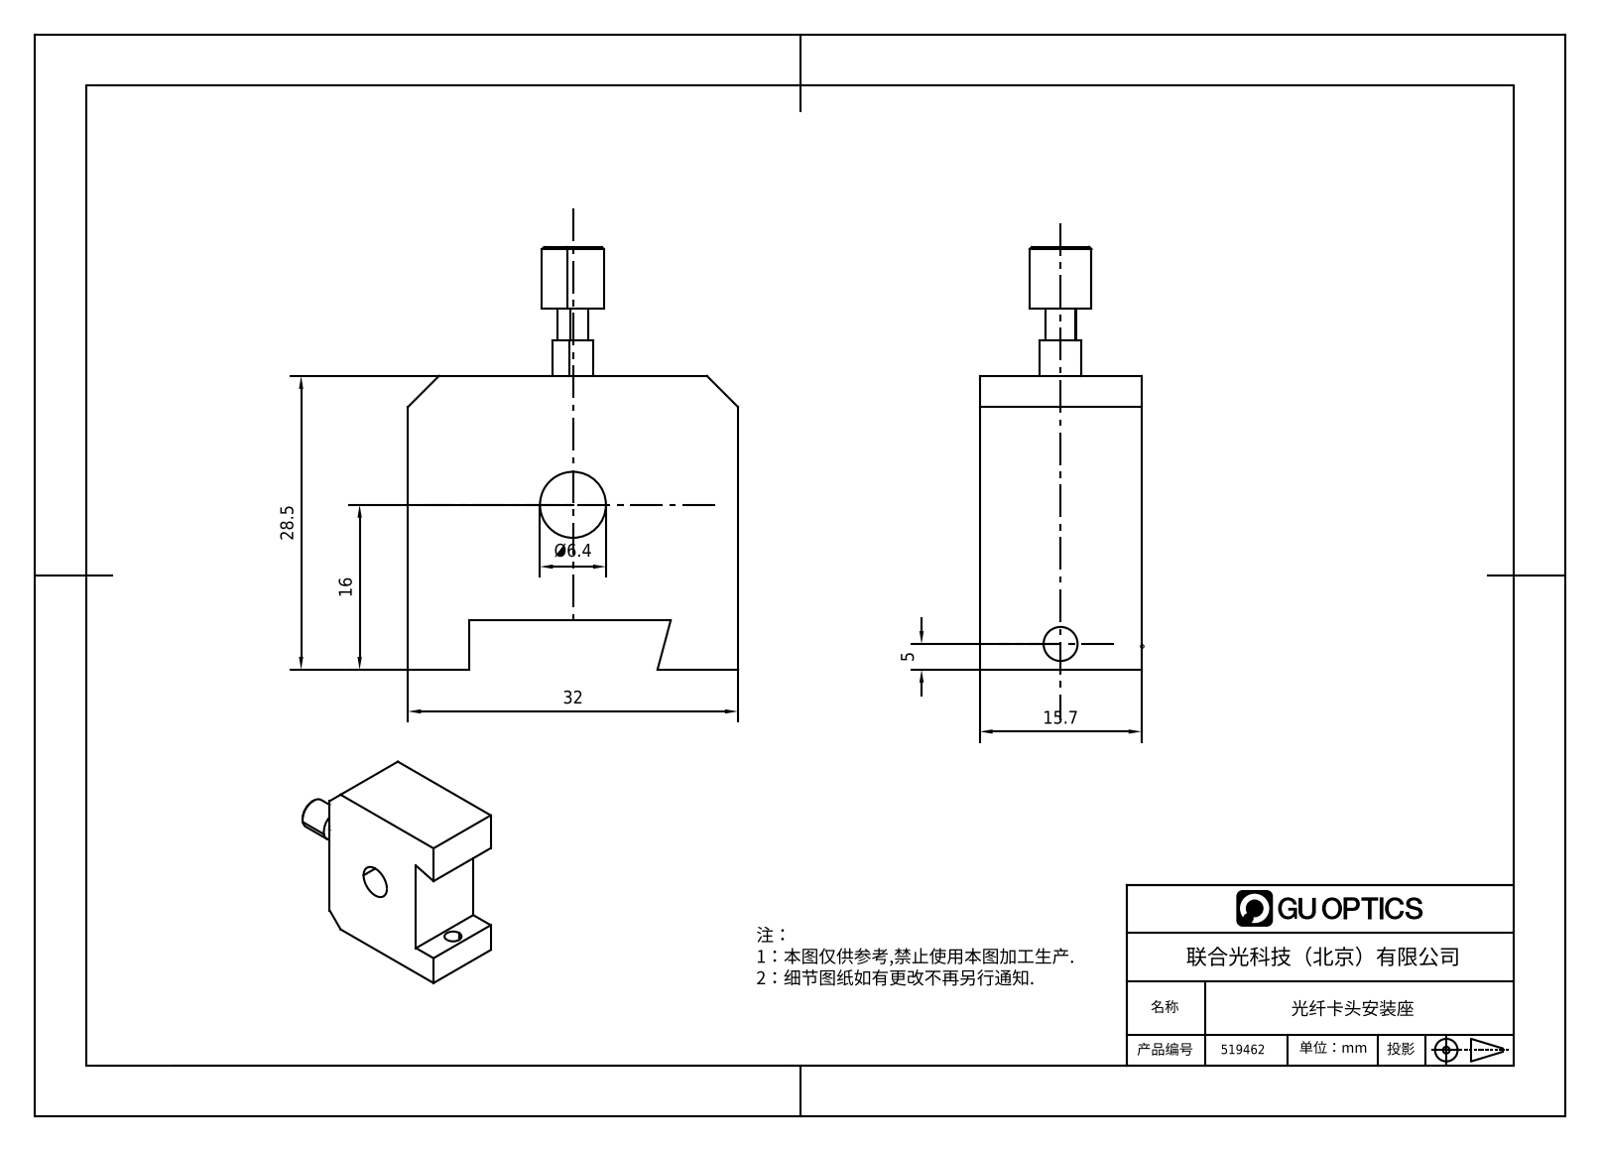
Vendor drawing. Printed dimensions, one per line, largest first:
32
28.5
16
15.7
Ø6.4
5
